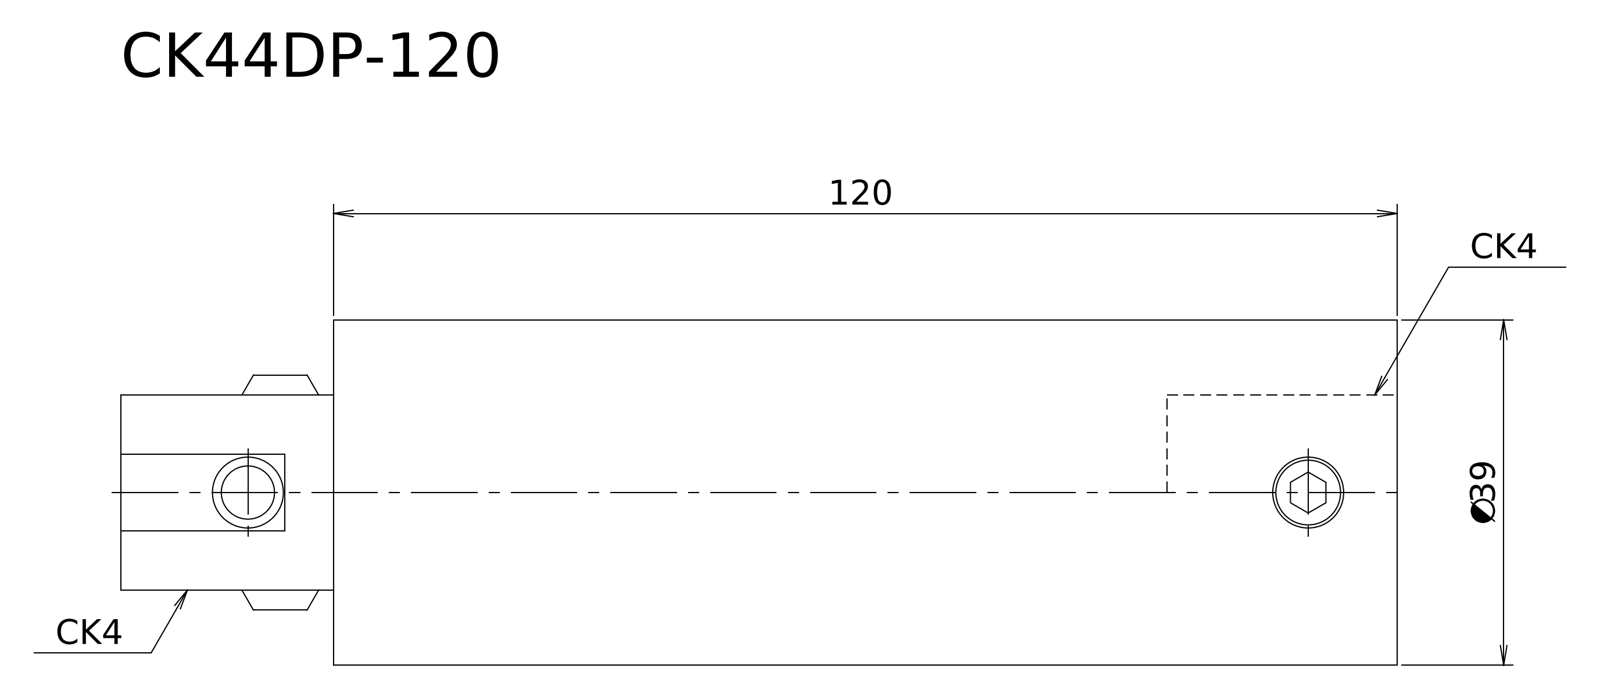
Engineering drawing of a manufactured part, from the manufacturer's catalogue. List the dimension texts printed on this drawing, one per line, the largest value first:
120.00
{\H2.8;∅}39.00
